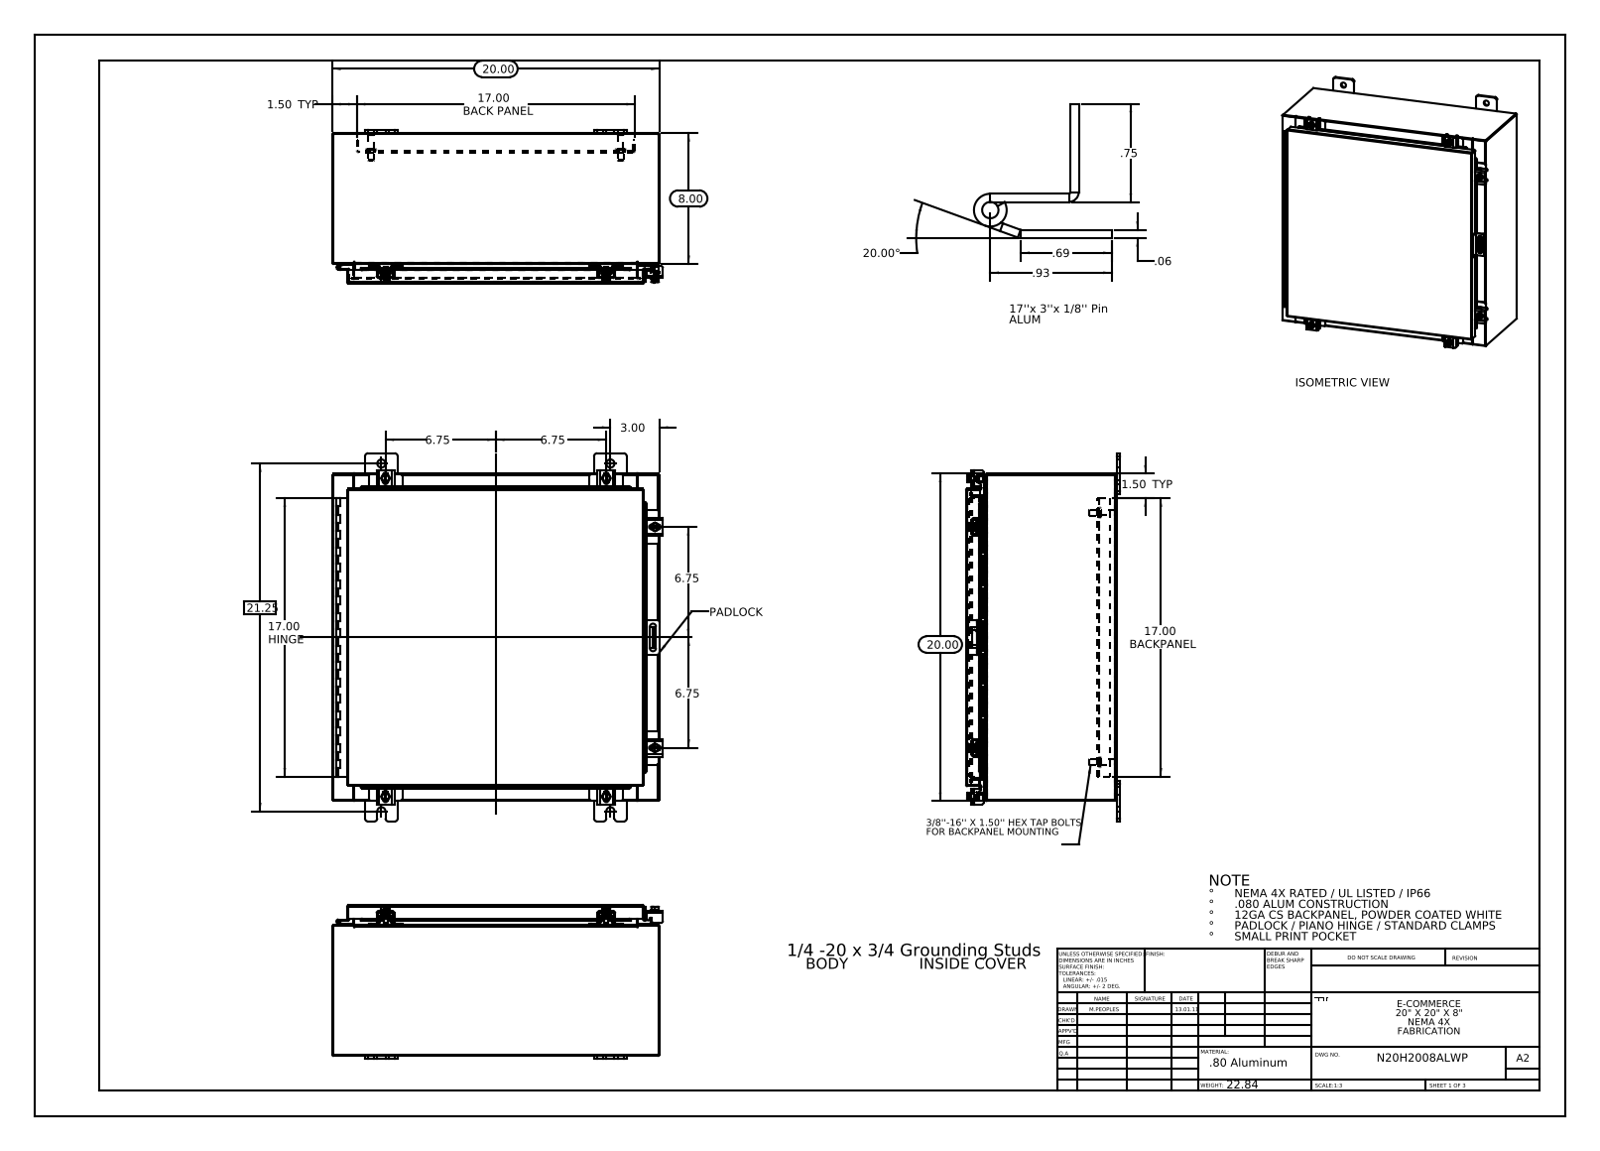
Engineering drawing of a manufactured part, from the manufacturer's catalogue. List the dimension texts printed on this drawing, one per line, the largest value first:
21.25
20.00
20.00
20.00°
17.00 HINGE
17.00 BACK PANEL
17.00 BACKPANEL
8.00
6.75
6.75
6.75
6.75
3.00
1.50 TYP
1.50 TYP
.93
.75
.69
.06
